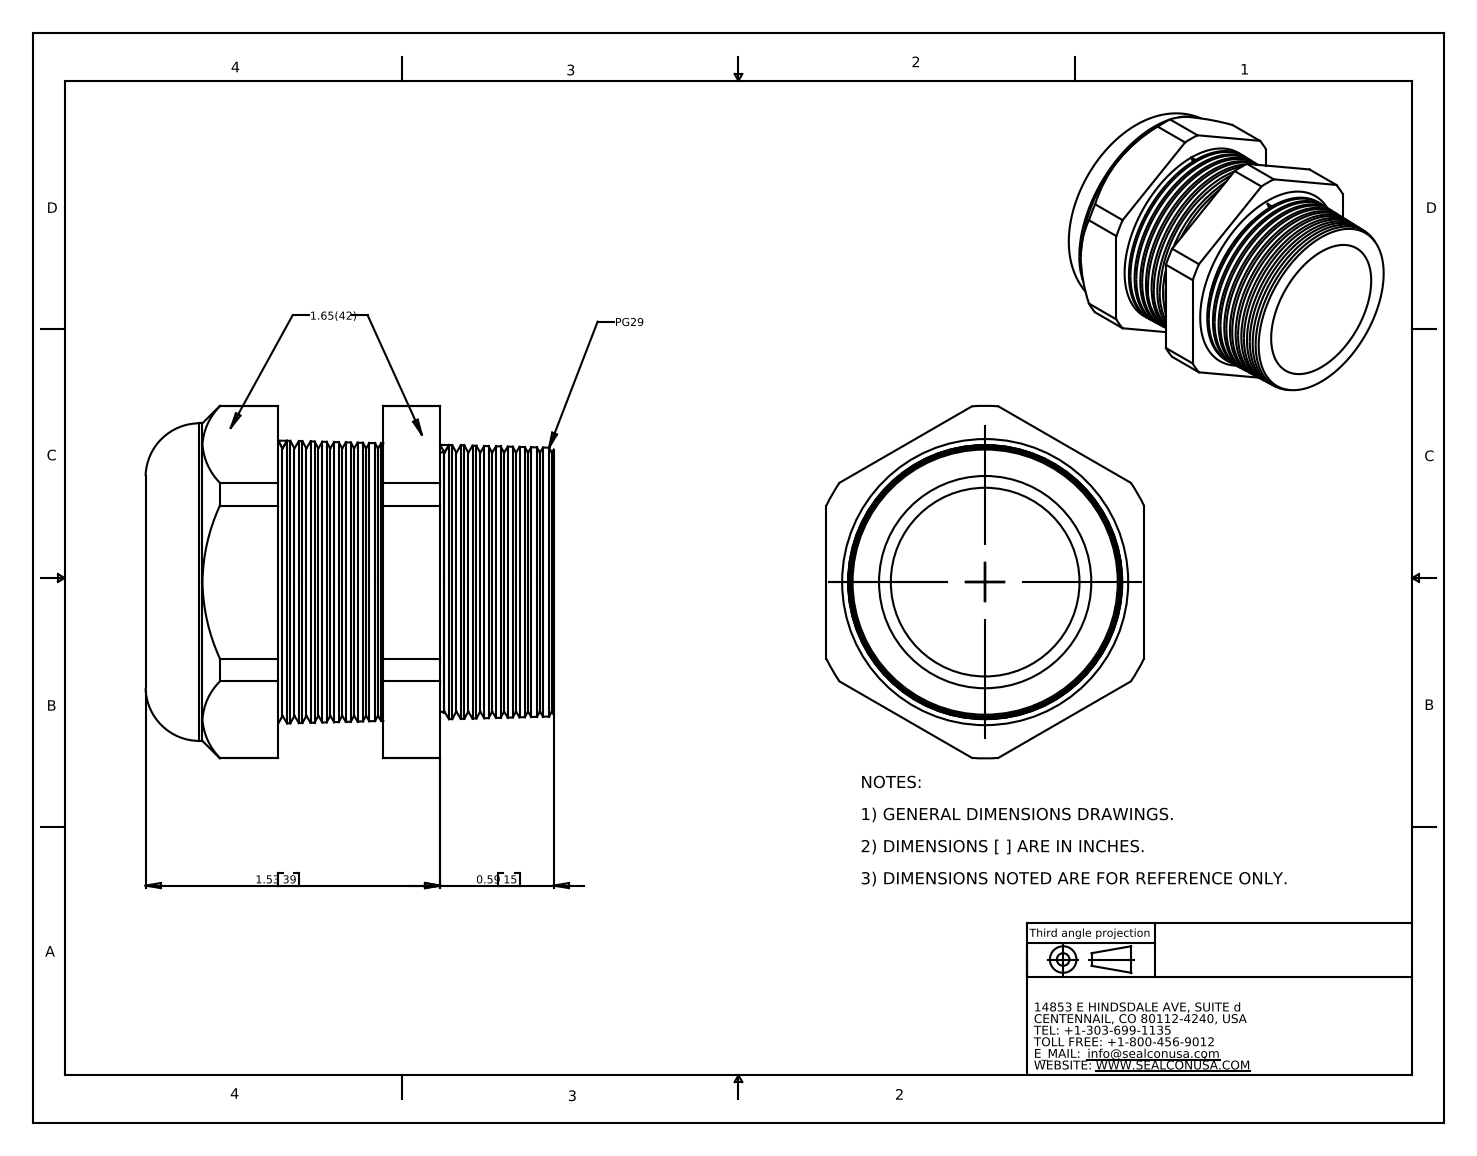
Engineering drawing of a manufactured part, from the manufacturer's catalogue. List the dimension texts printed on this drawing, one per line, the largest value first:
1.53 39
0.59 15
